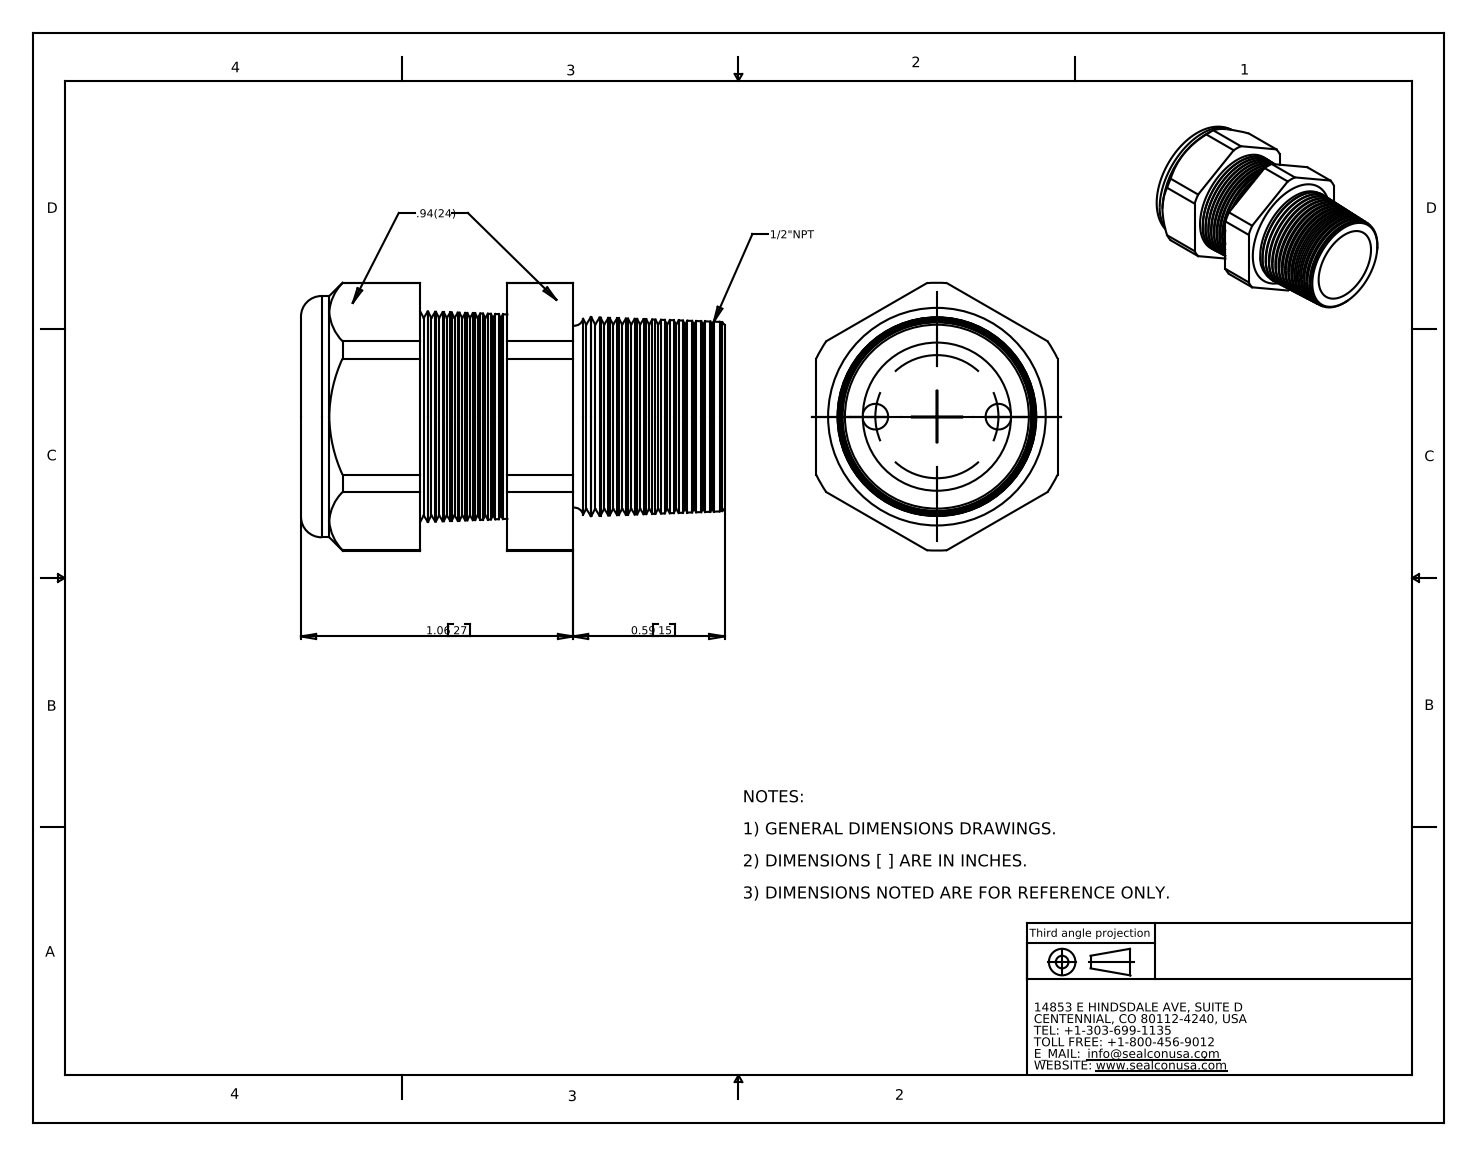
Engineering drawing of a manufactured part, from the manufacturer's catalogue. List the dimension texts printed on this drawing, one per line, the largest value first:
1.06 27
0.59 15
